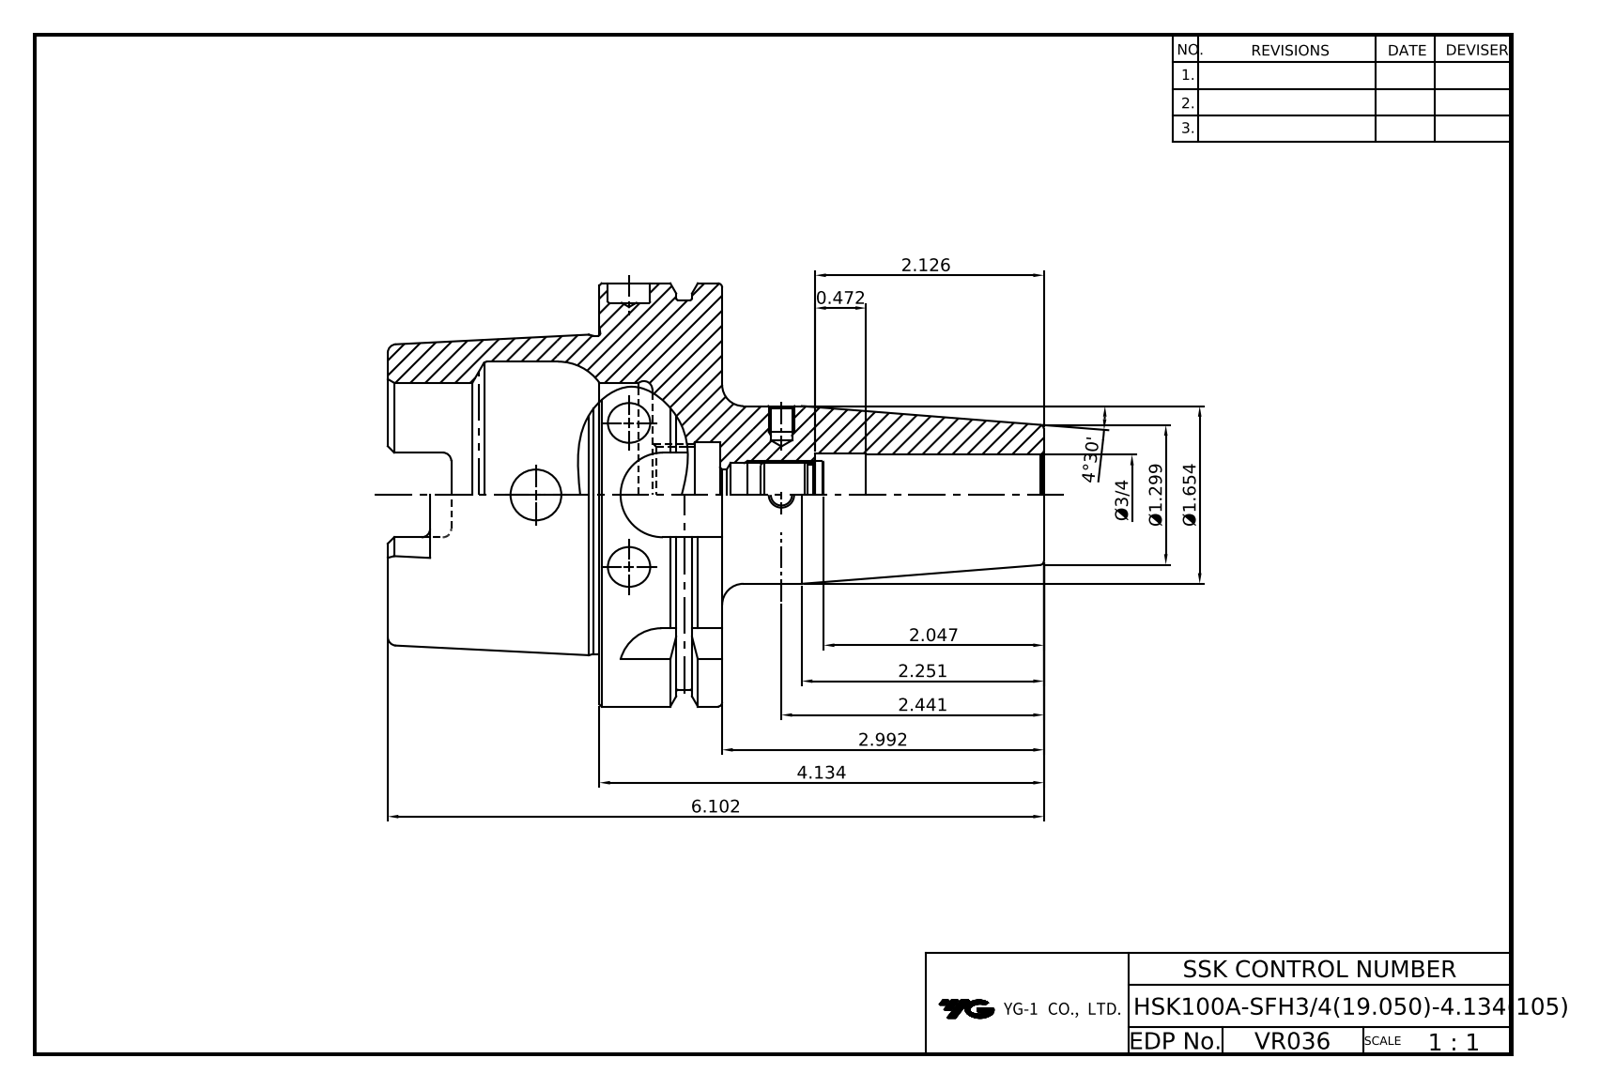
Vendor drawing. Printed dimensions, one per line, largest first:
6.102
4.134
4°30'
2.992
2.441
2.251
2.126
2.047
Ø1.654
Ø1.299
Ø3/4
0.472
